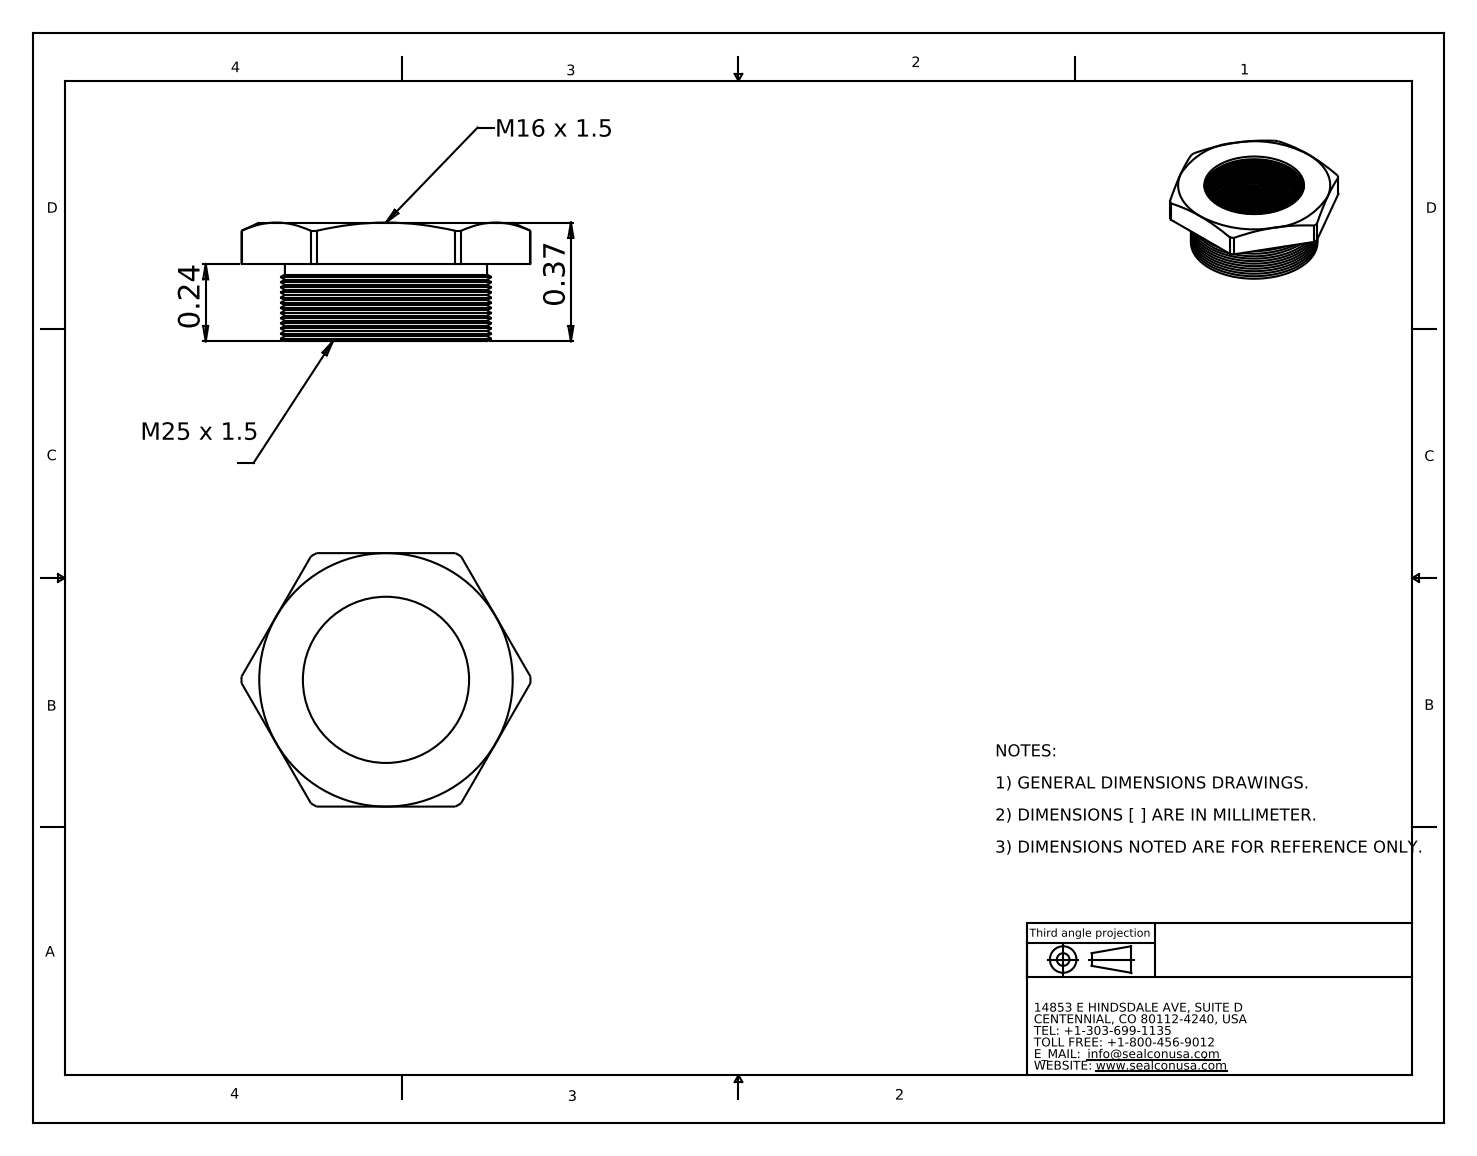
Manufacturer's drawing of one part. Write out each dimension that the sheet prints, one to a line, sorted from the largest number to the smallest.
0.37
0.24
